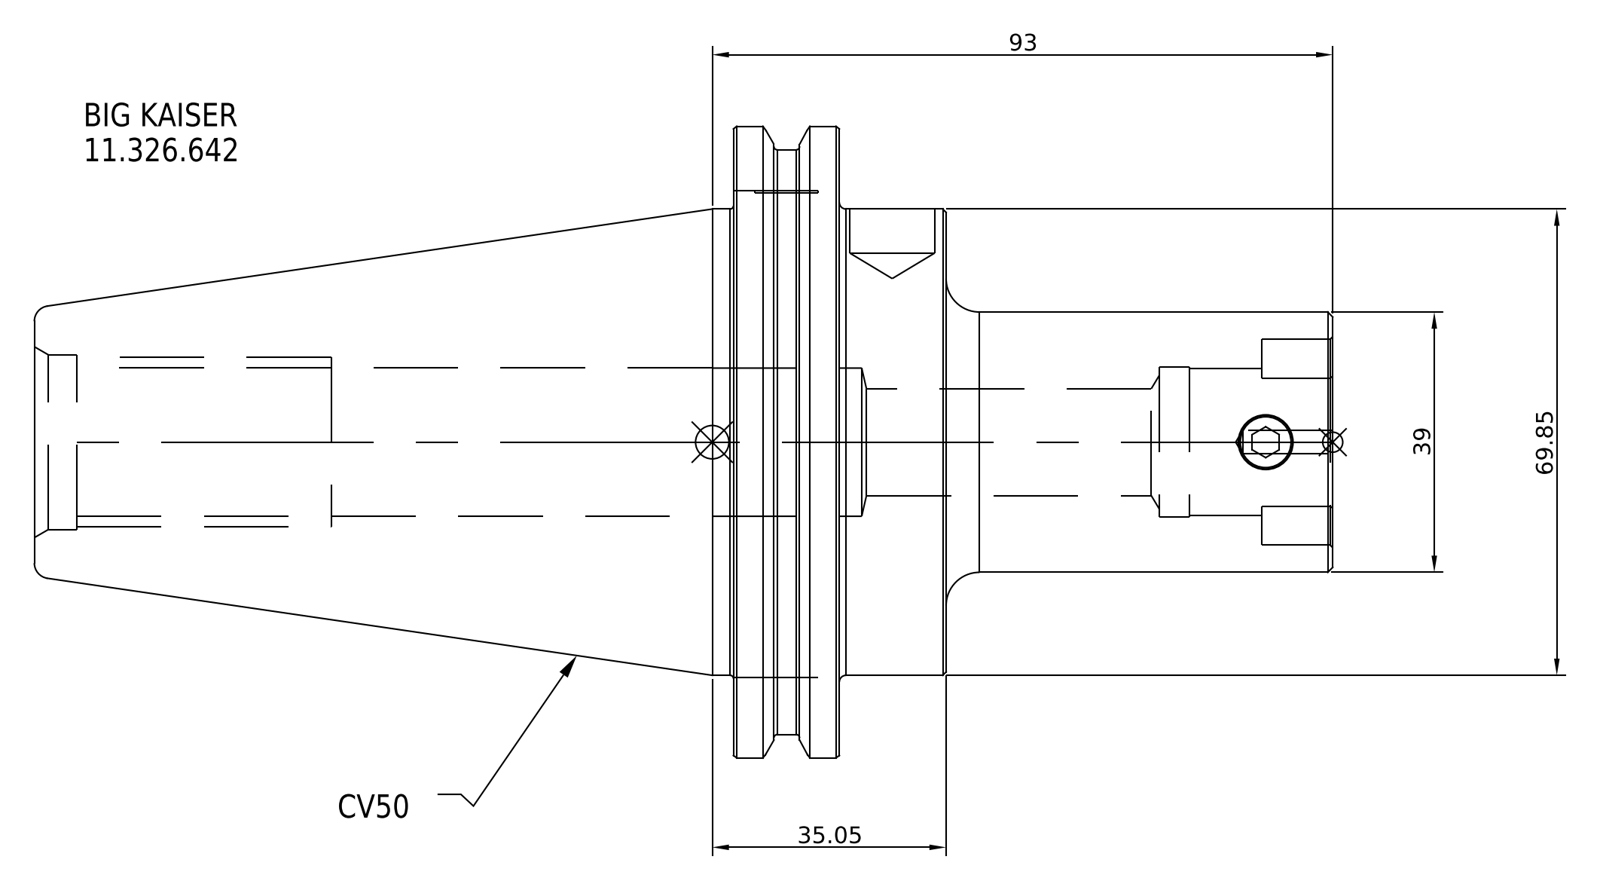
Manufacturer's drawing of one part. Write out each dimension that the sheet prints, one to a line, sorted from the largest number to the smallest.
93
69.85
39
35.05
